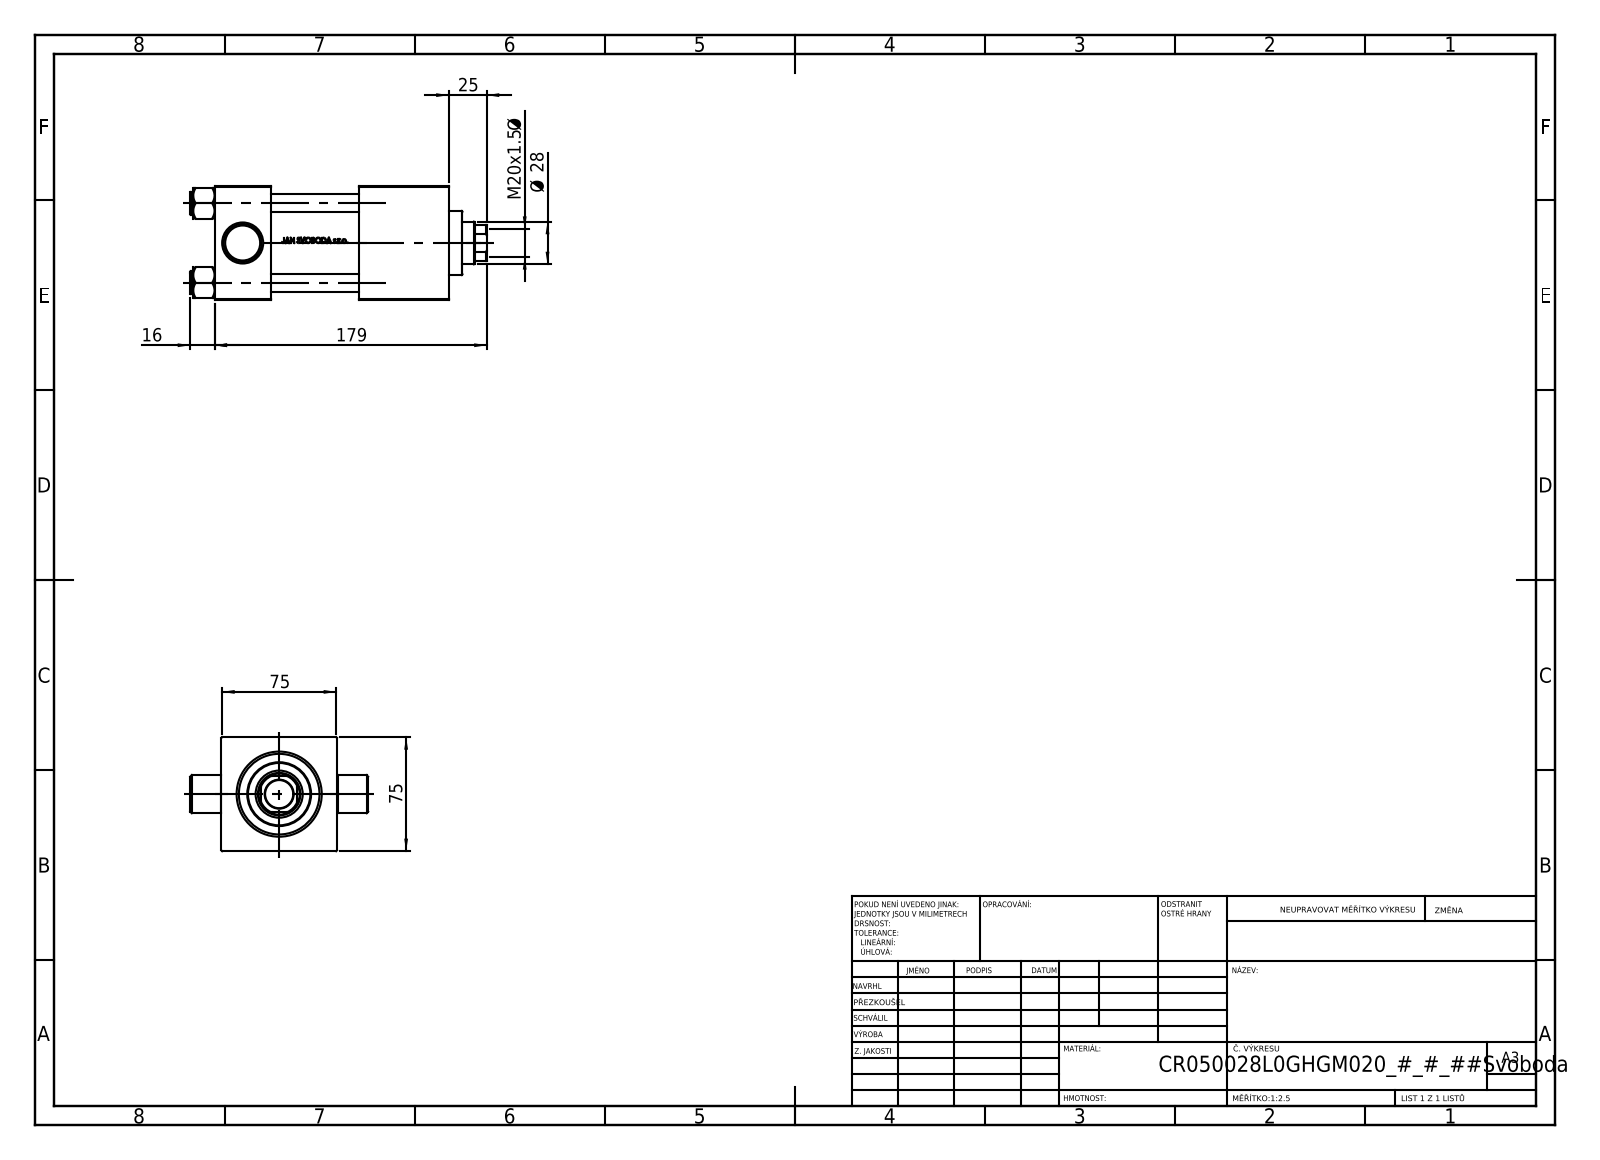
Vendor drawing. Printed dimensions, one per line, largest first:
179
75
75
Ø 28
25
M20x1.5 Ø
16
